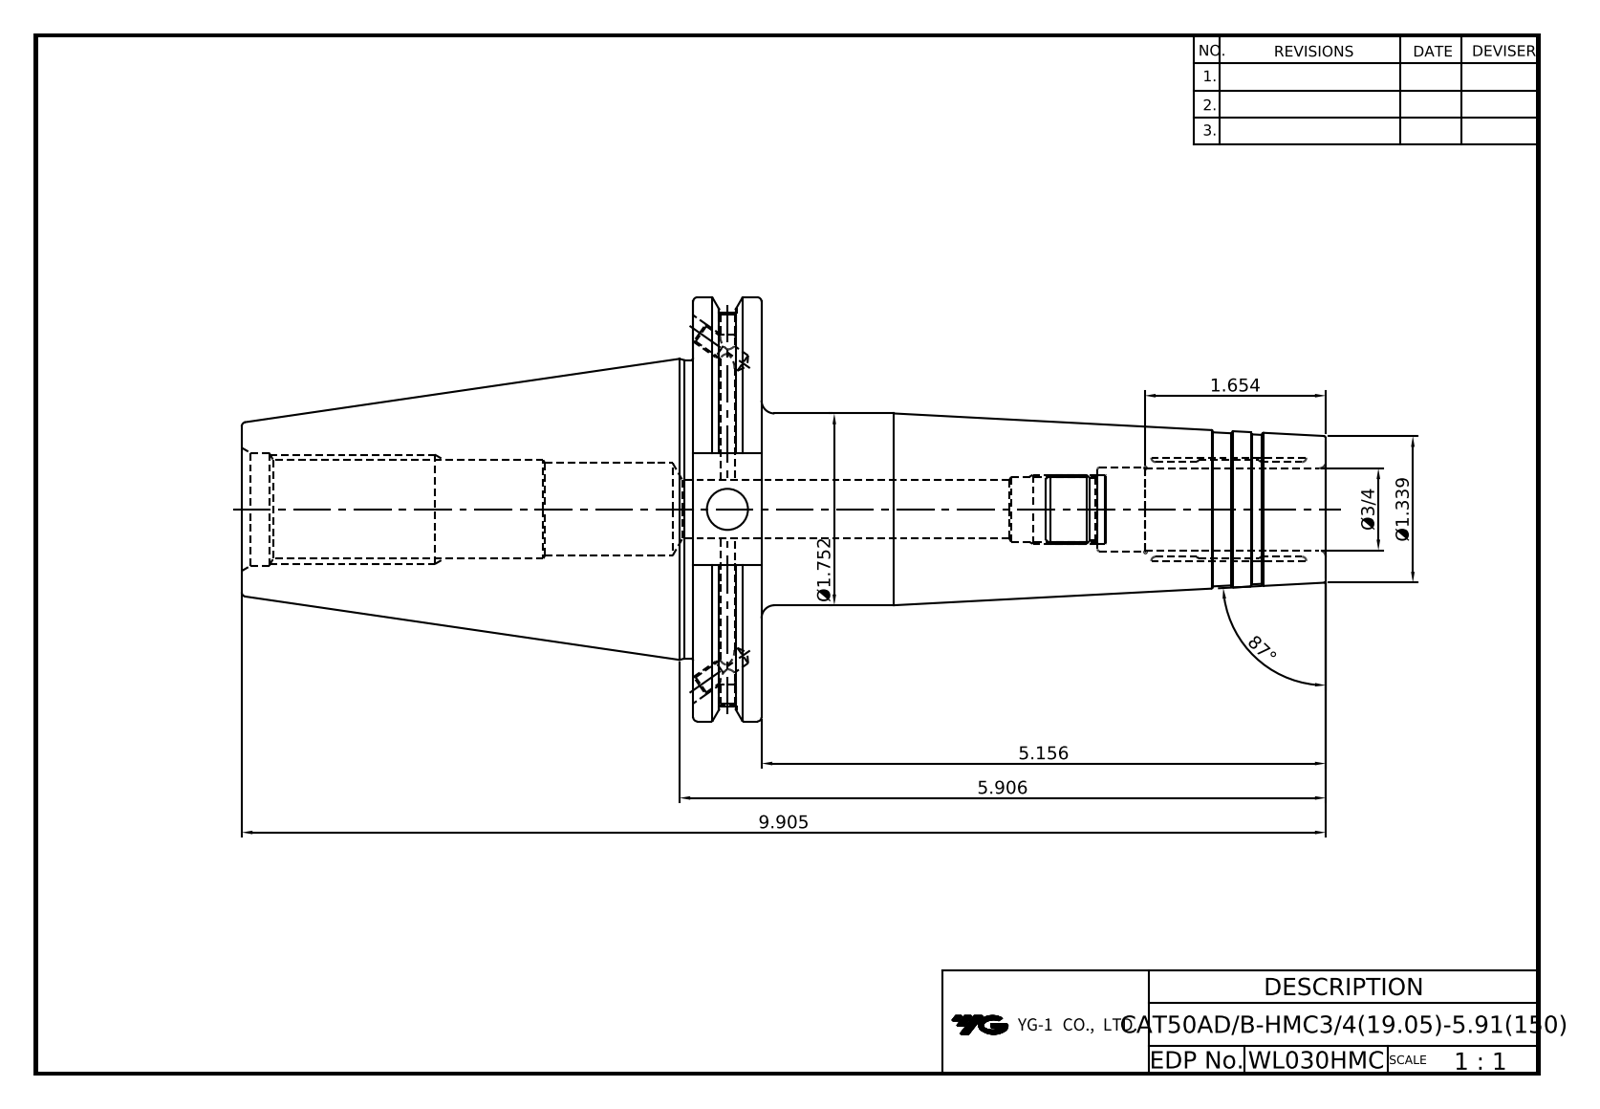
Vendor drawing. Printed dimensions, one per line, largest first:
87°
9.905
5.906
5.156
Ø1.752
1.654
Ø1.339
Ø3/4
